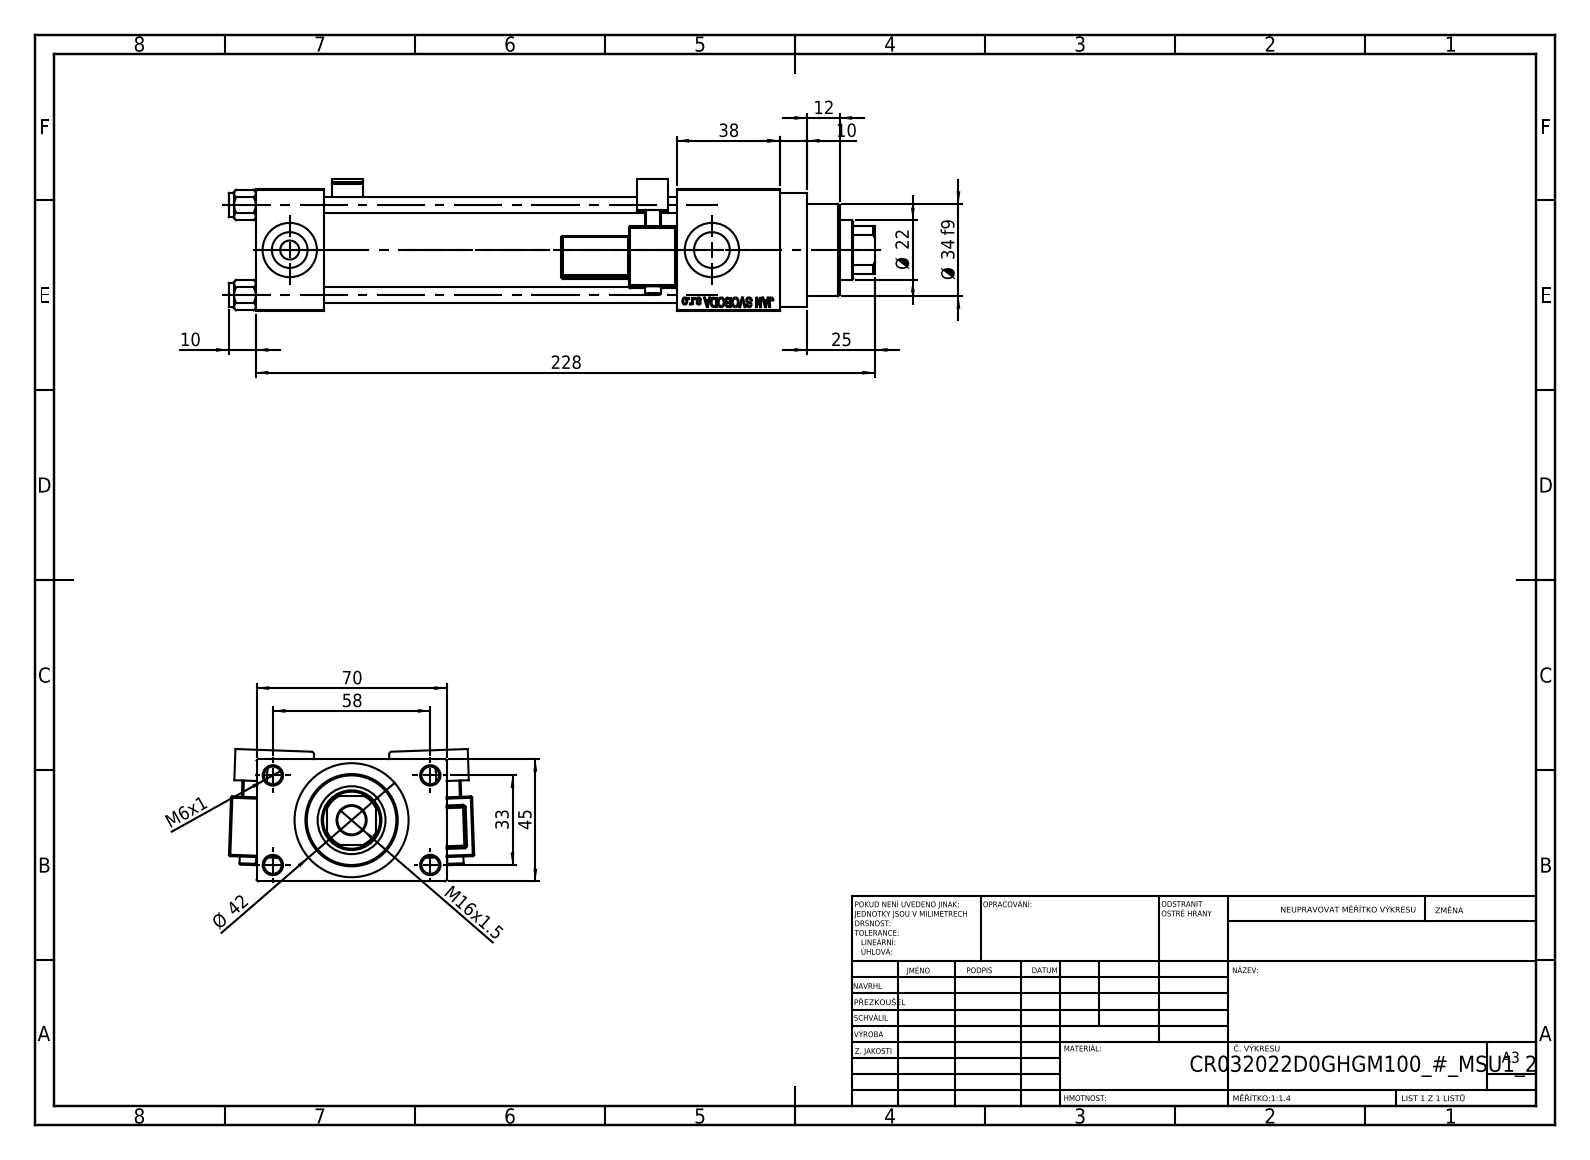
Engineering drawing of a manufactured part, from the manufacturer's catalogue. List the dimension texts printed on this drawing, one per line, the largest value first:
228
70
58
45
Ø 42
38
Ø 34 f9
33
25
Ø 22
M16x1.5
12
10
10
M6x1
